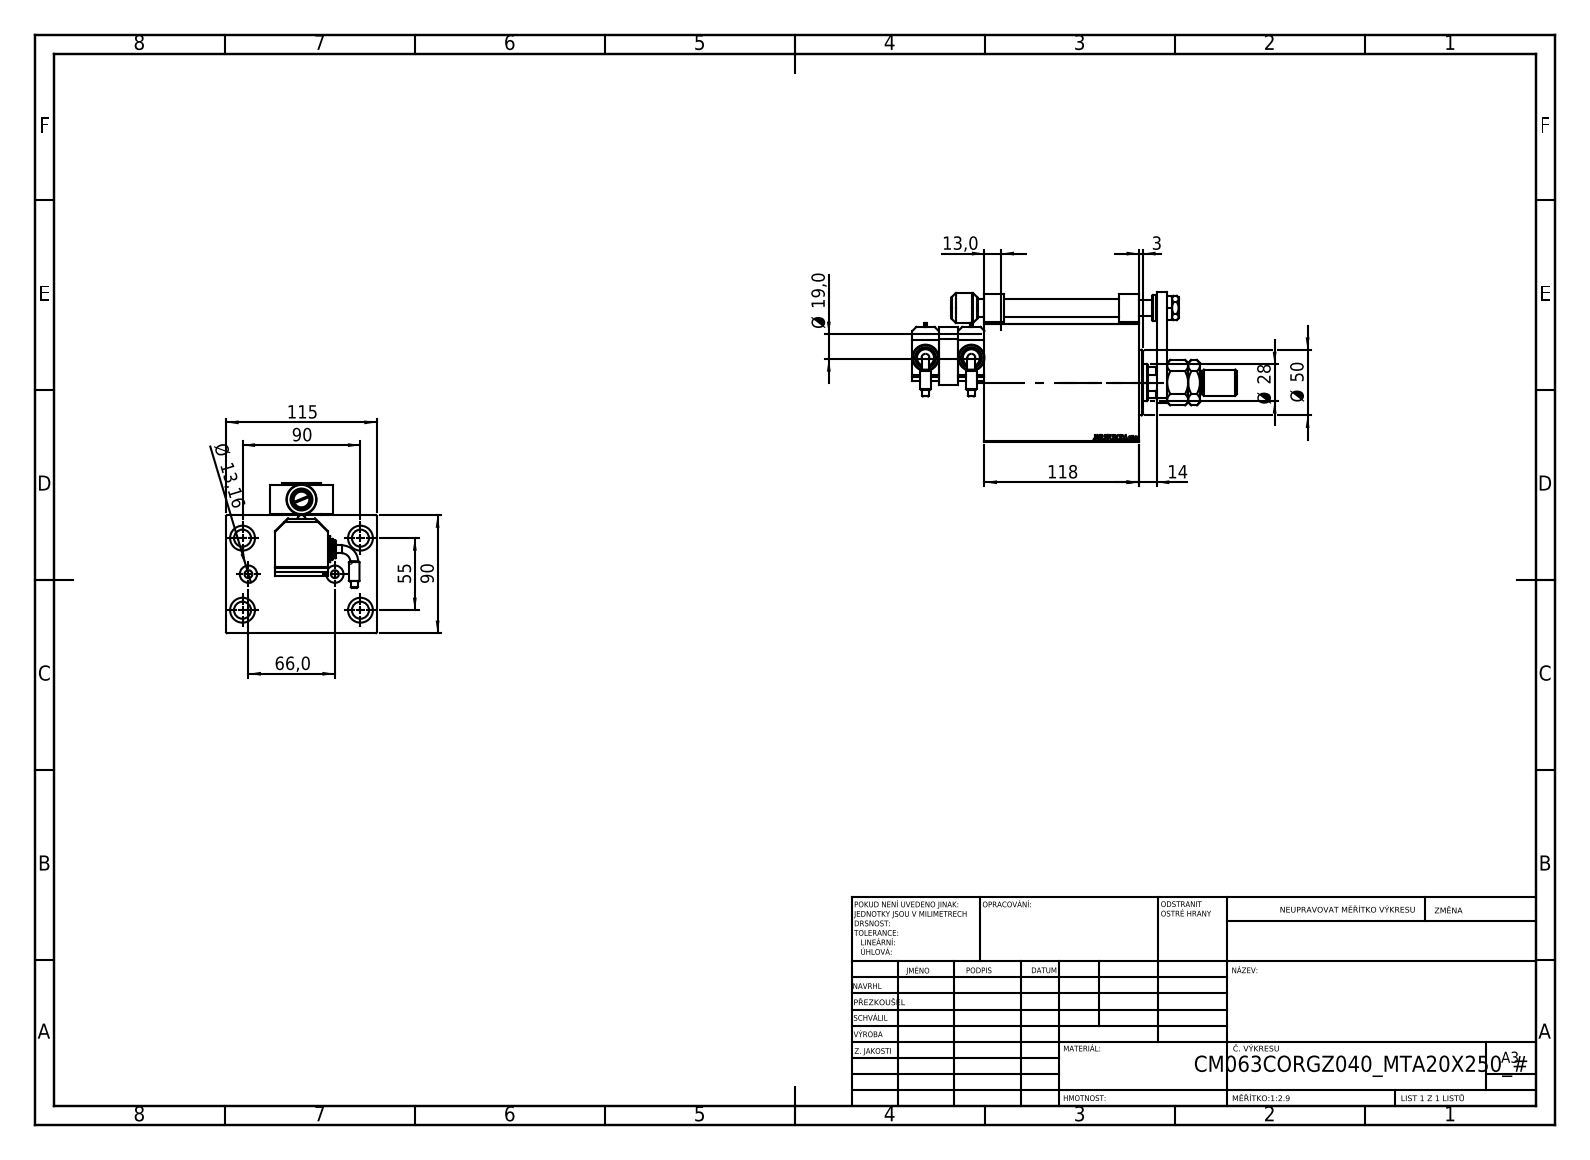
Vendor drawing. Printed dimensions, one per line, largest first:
118
115
90
90
66,0
55
Ø 50
Ø 28
Ø 19,0
14
Ø 13,16
13,0
3
